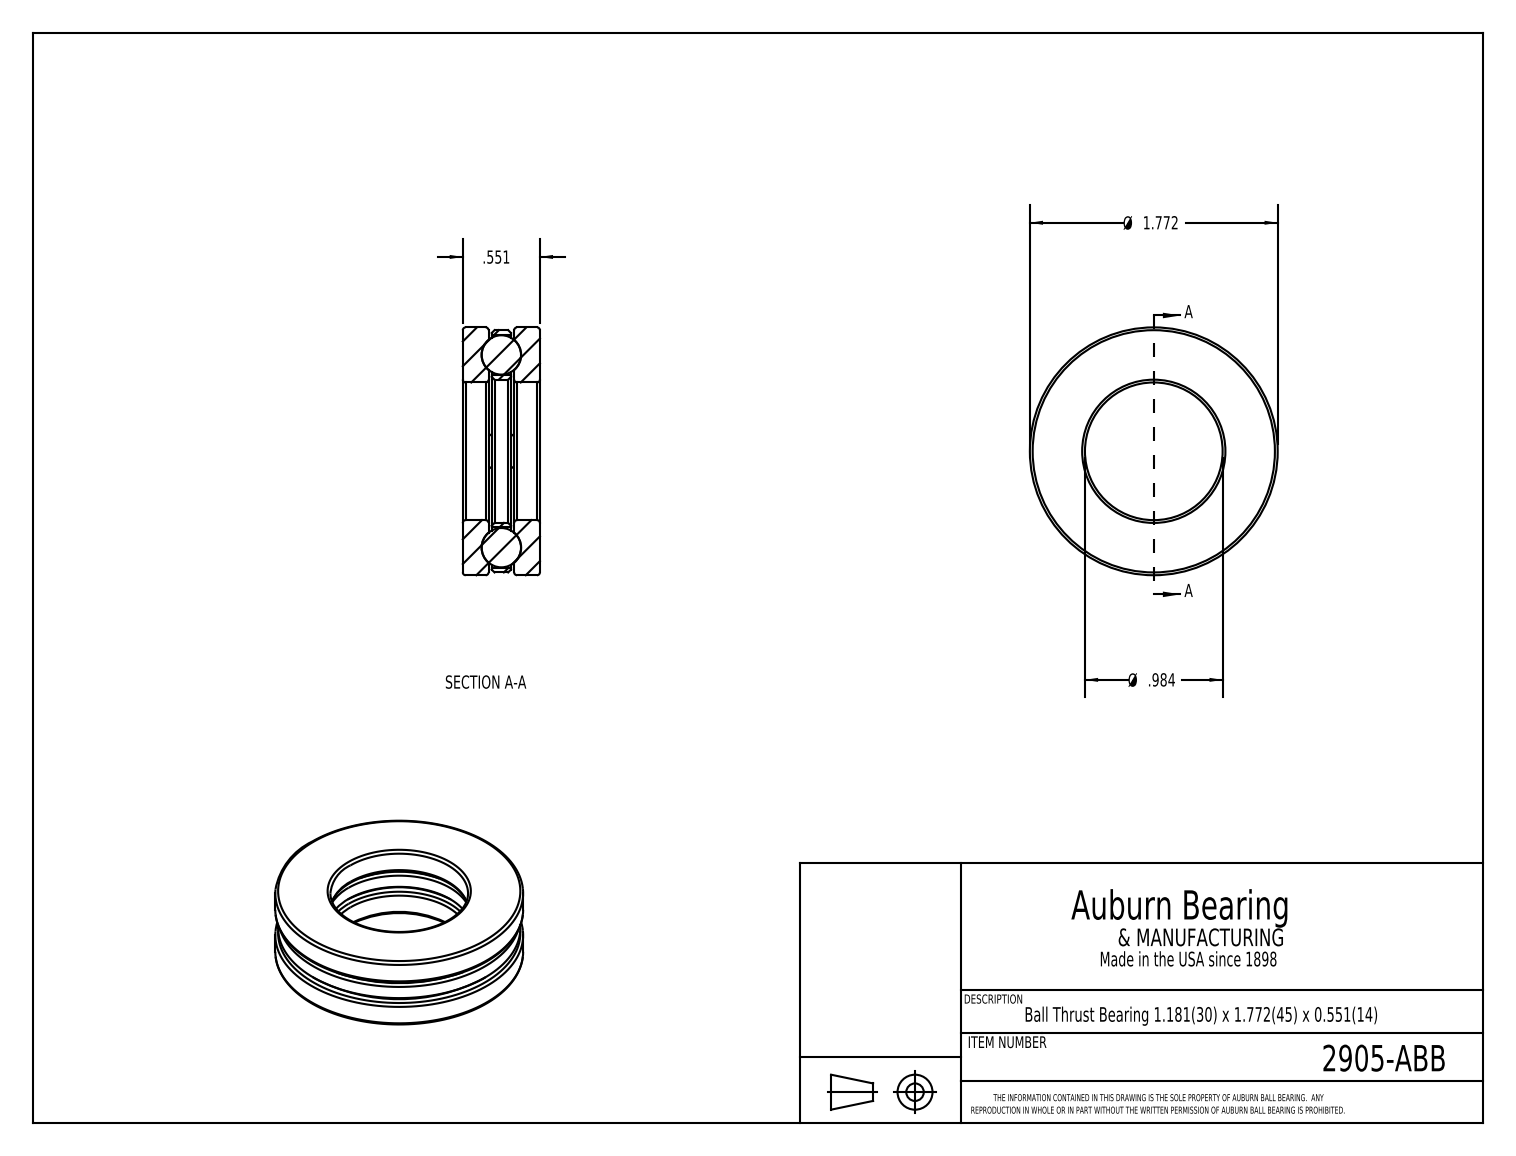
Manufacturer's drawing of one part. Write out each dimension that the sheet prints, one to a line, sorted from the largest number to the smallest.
Ø 1.772
Ø .984
.551
